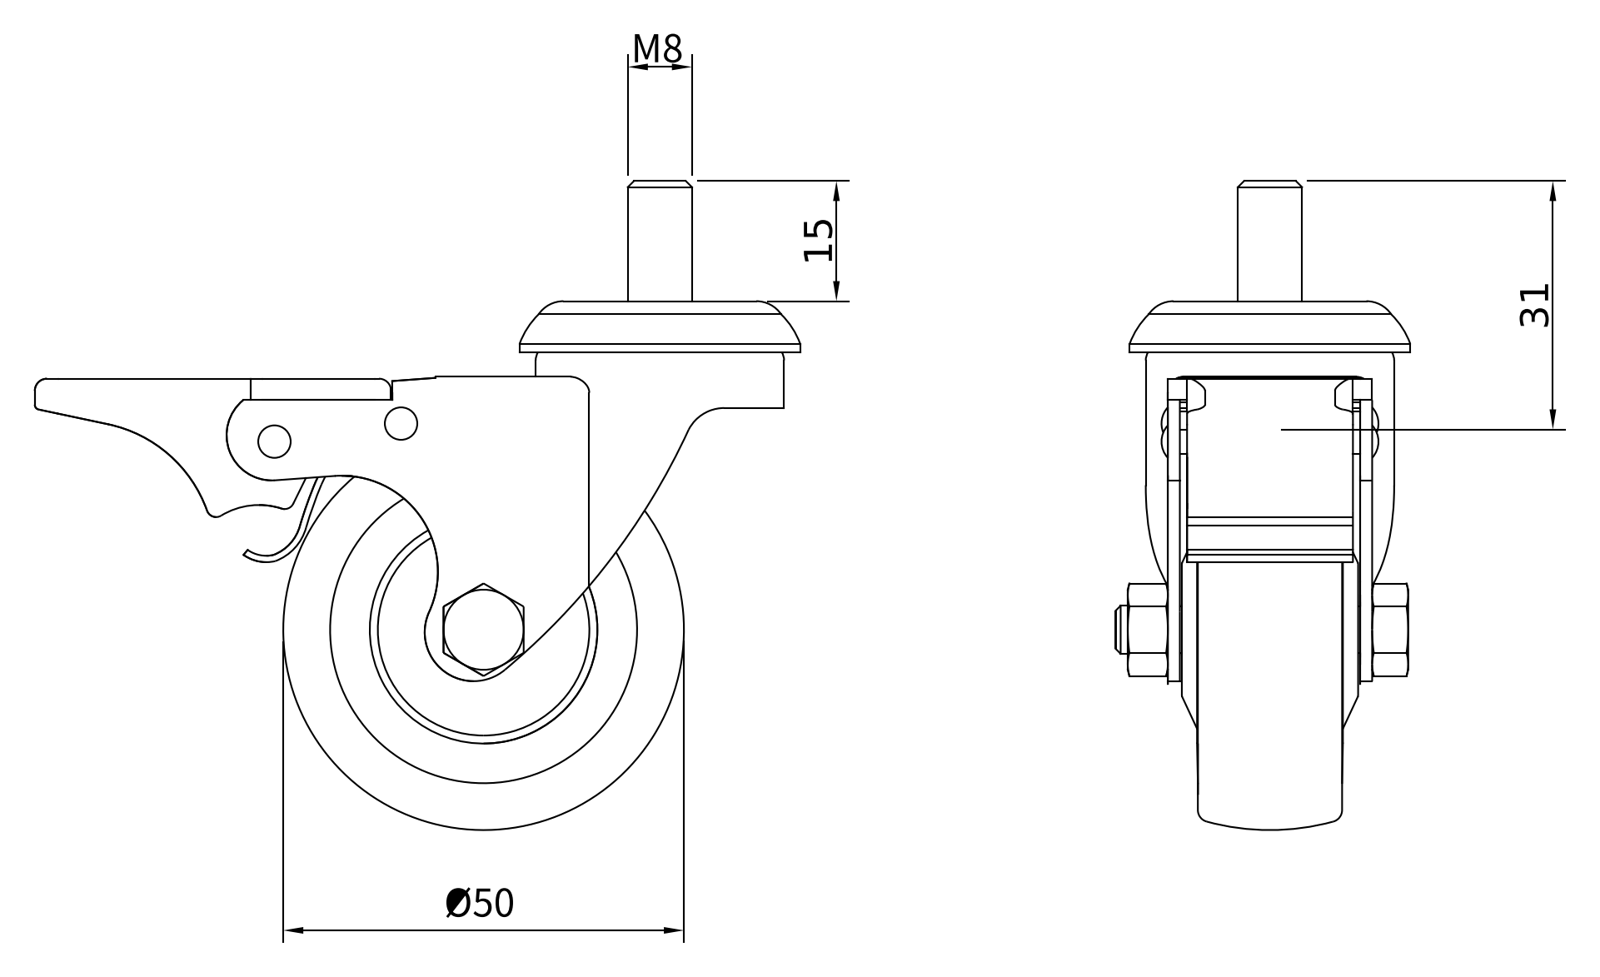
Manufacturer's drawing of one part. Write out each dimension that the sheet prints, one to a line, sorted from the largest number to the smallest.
Ø50
31
15
M8
